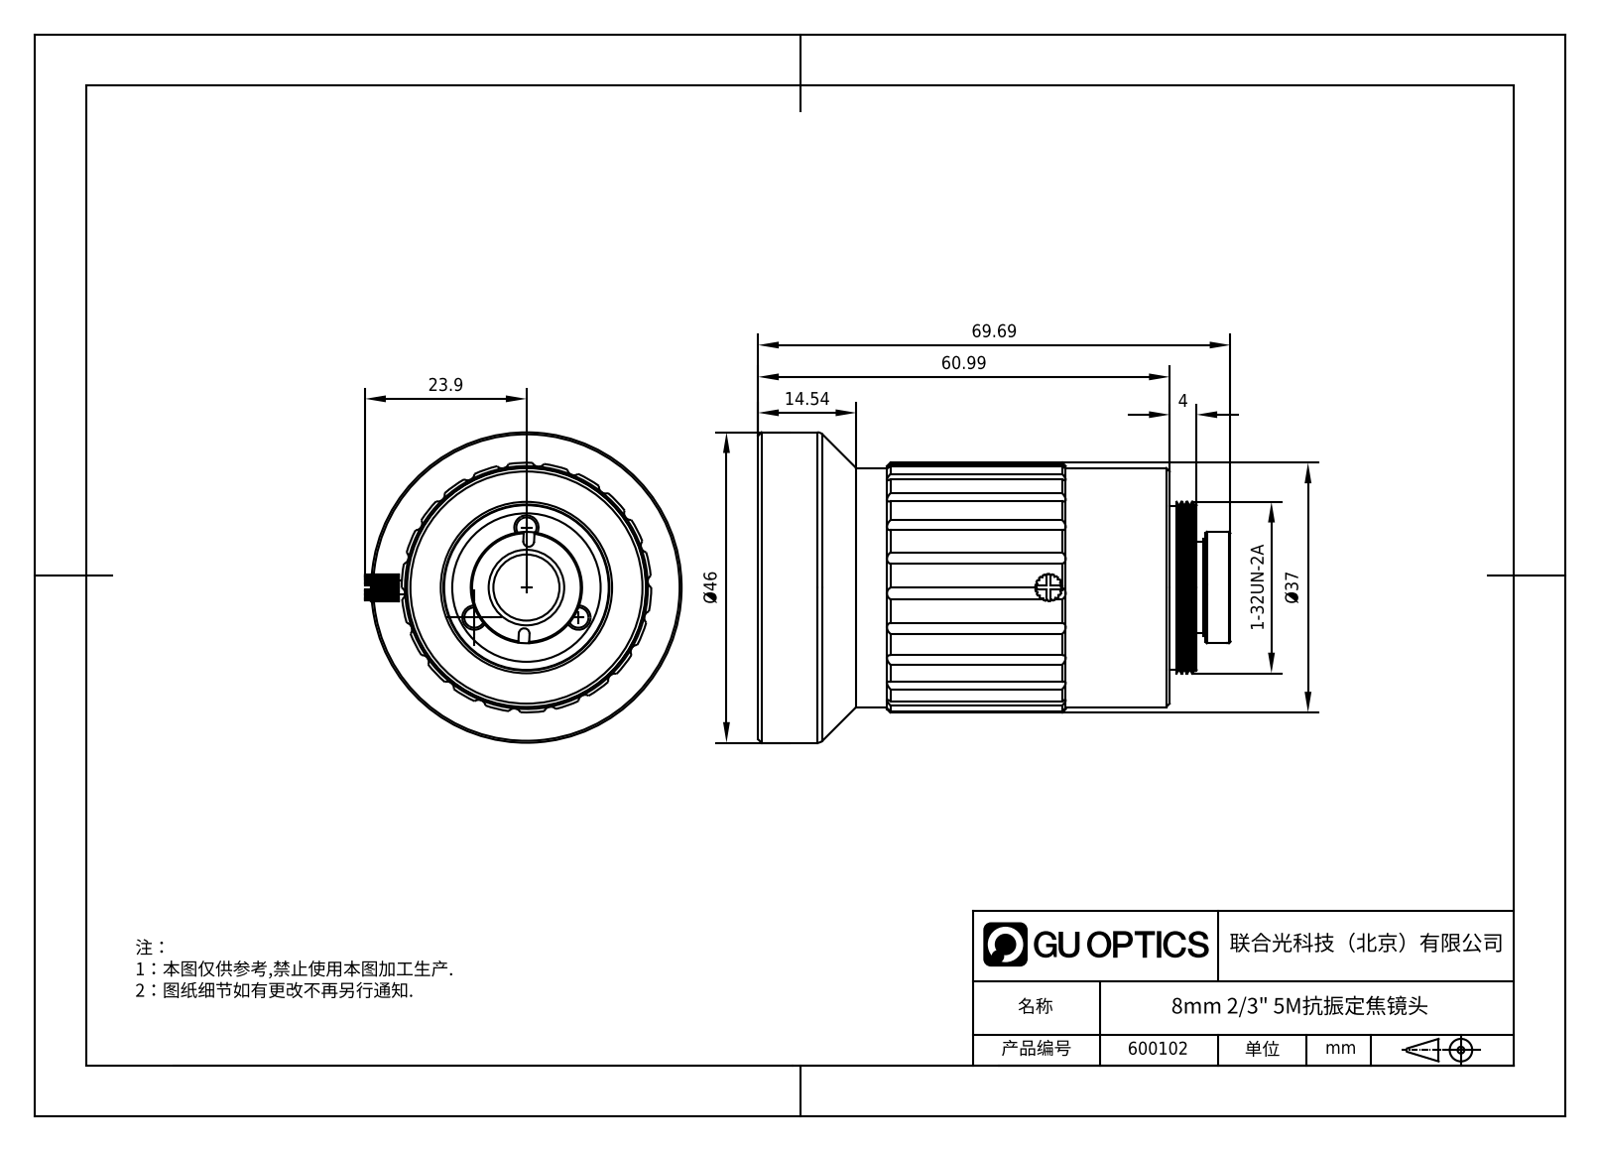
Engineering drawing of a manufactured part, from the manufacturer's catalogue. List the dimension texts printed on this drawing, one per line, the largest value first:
69.69
60.99
Ø46
Ø37
23.9
14.54
4
1-32UN-2A
